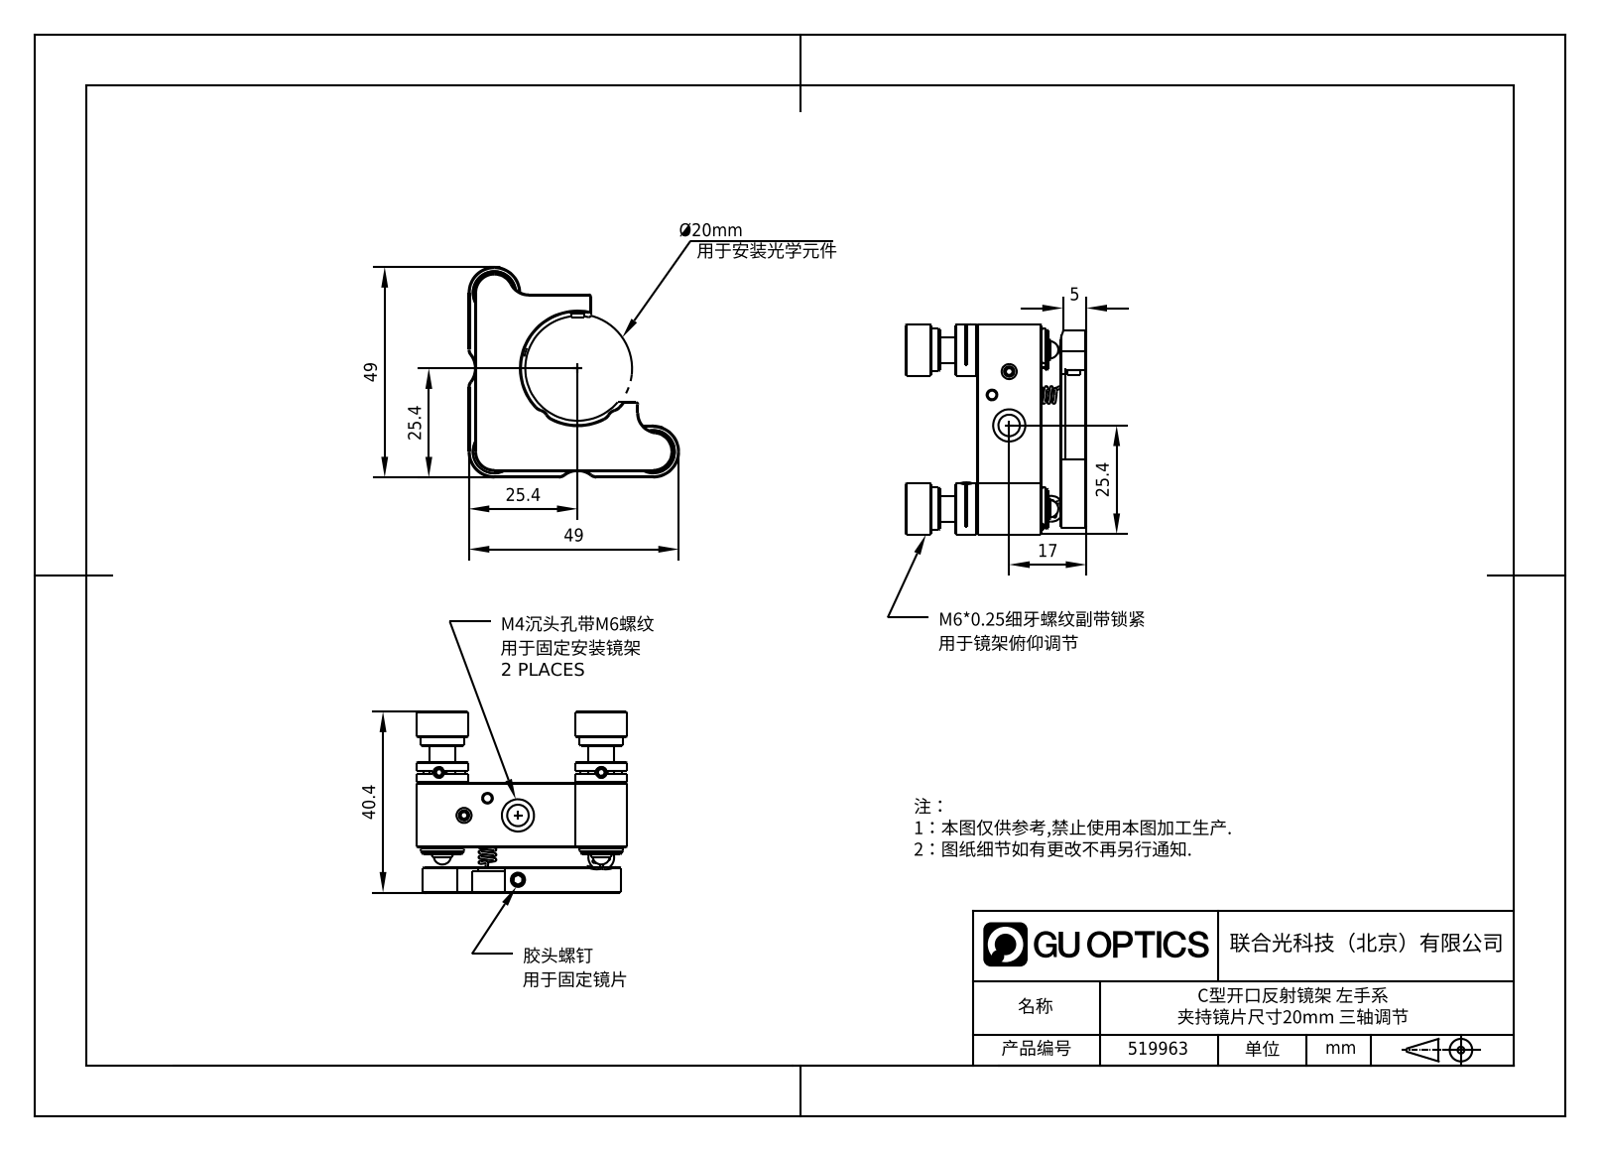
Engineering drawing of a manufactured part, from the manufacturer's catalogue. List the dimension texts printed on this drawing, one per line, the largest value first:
49
49
40.4
25.4
25.4
25.4
17
5
